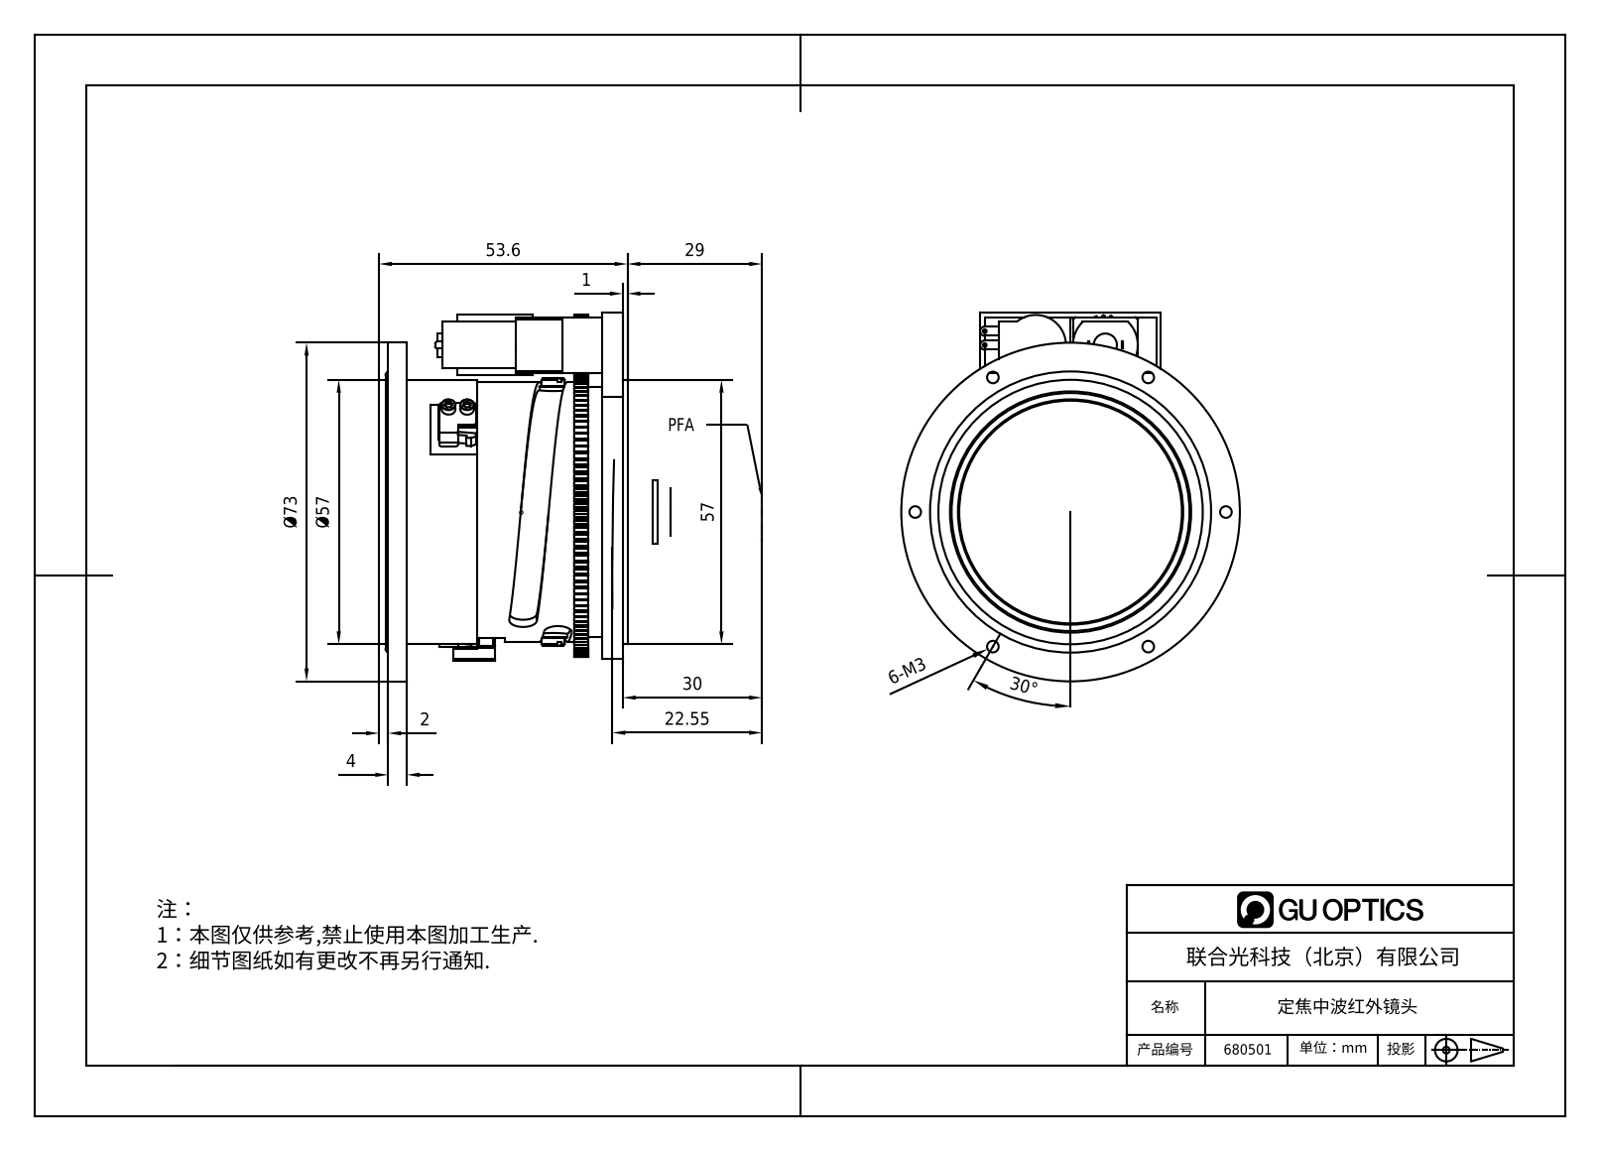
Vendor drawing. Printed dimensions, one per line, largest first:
Ø73
Ø57
57
53.6
30
30°
29
22.55
4
6-M3
2
1
